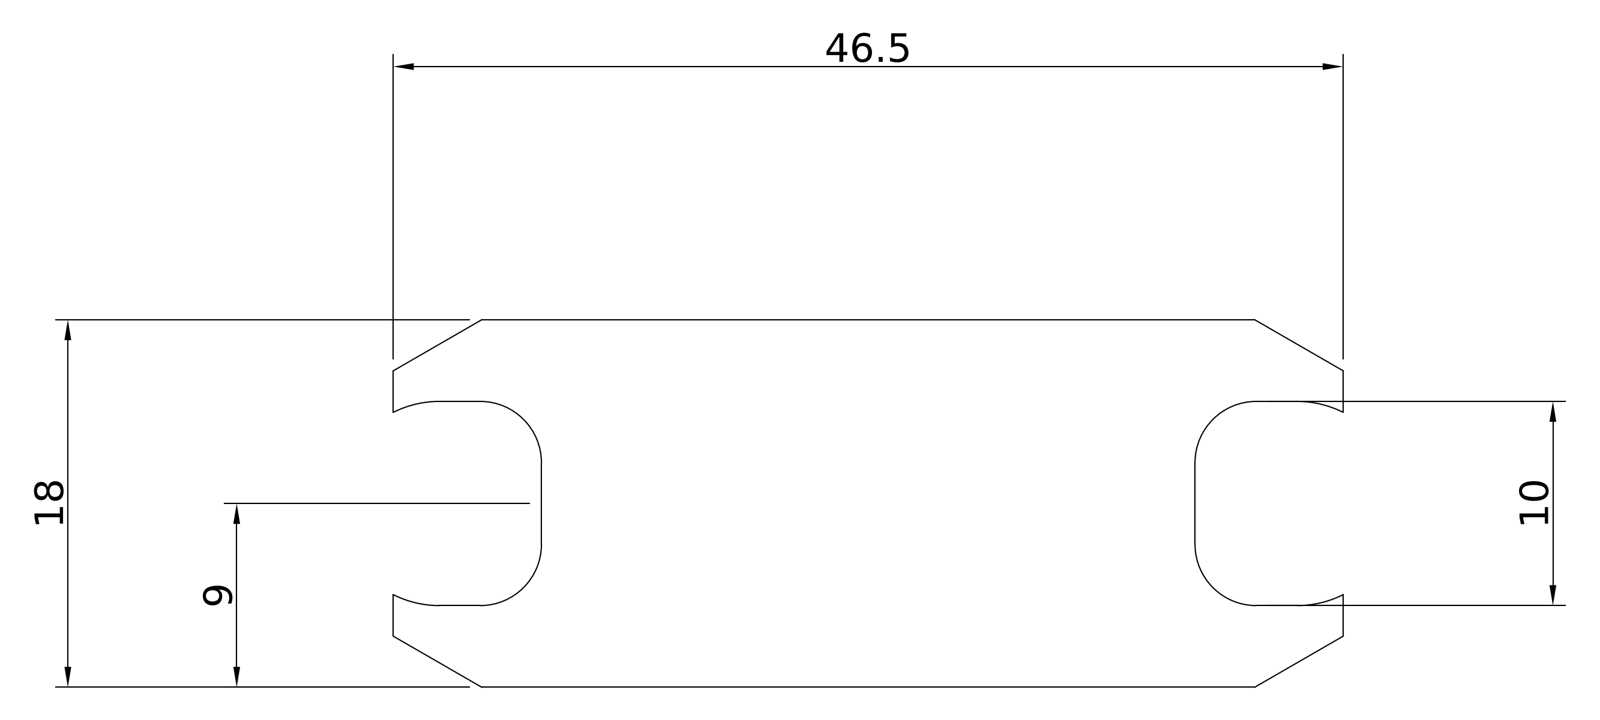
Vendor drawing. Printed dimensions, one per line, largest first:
46.5
18
10
9
